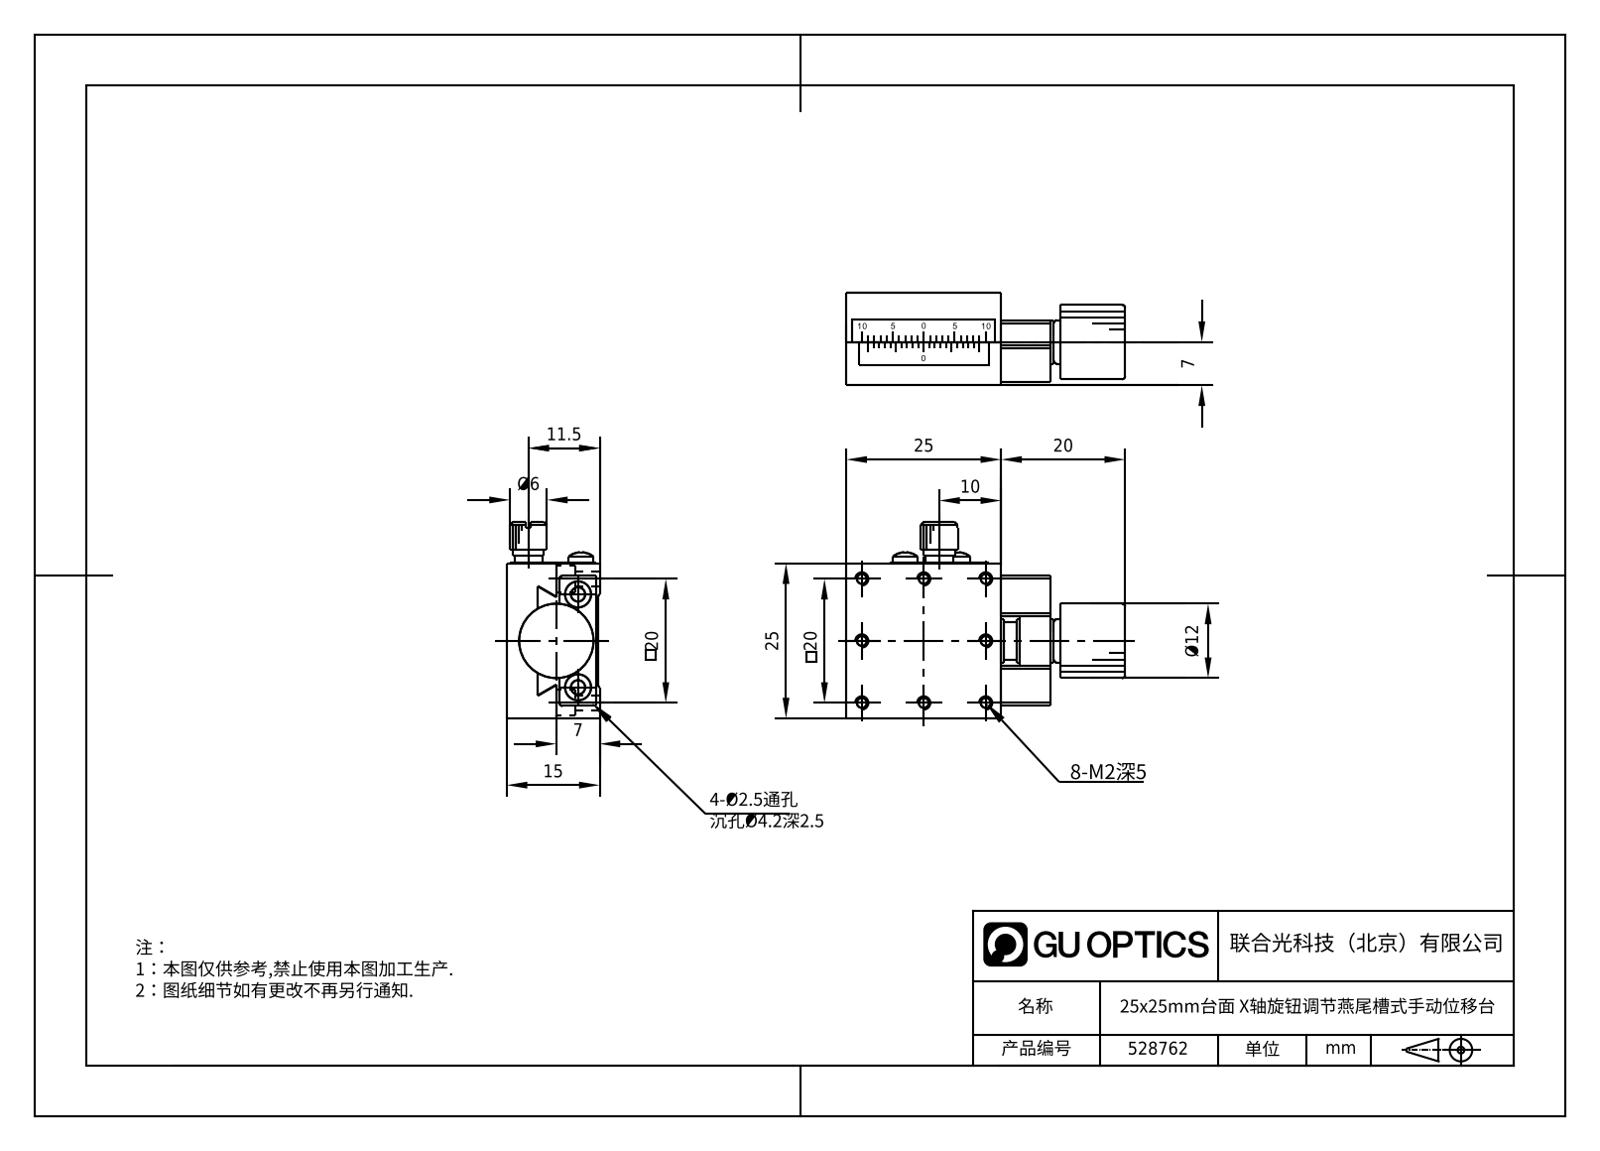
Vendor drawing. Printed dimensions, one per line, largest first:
25
25
20
20
20
15
Ø12
11.5
10
7
7
Ø6
